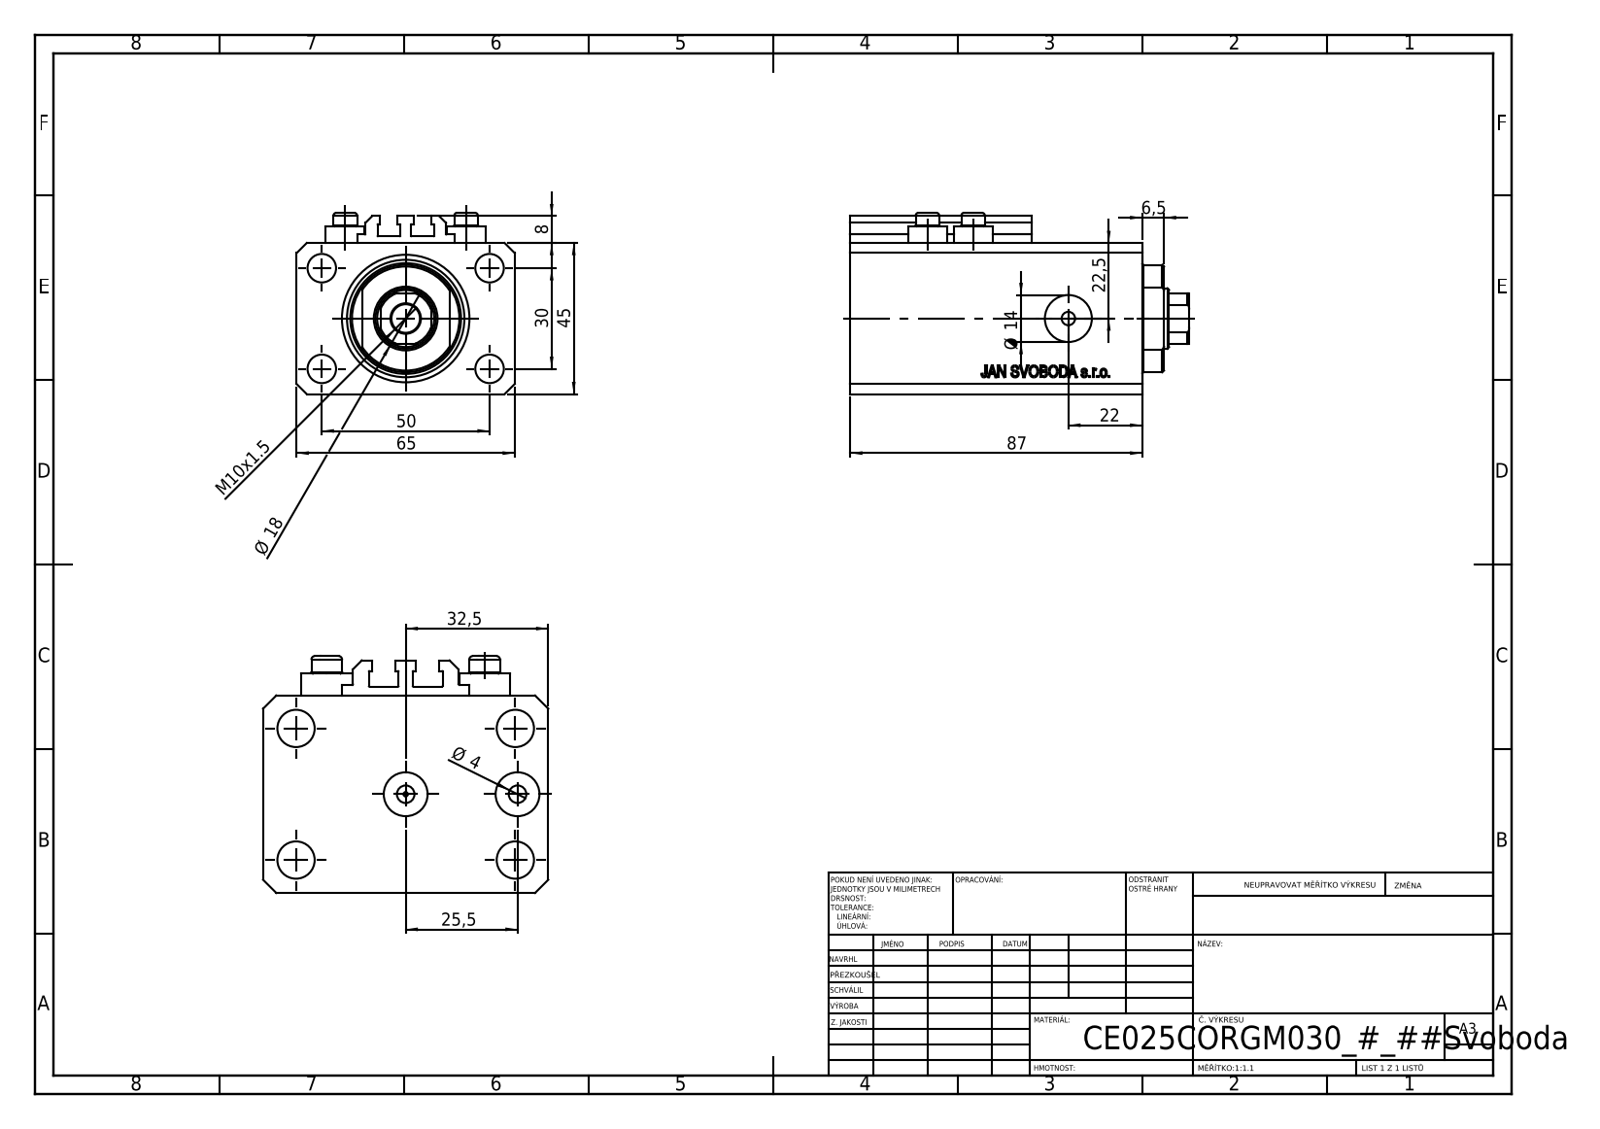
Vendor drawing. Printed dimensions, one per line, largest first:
87
65
50
45
32,5
30
25,5
22,5
22
Ø 18
Ø 14
M10x1.5
8
6,5
Ø 4
